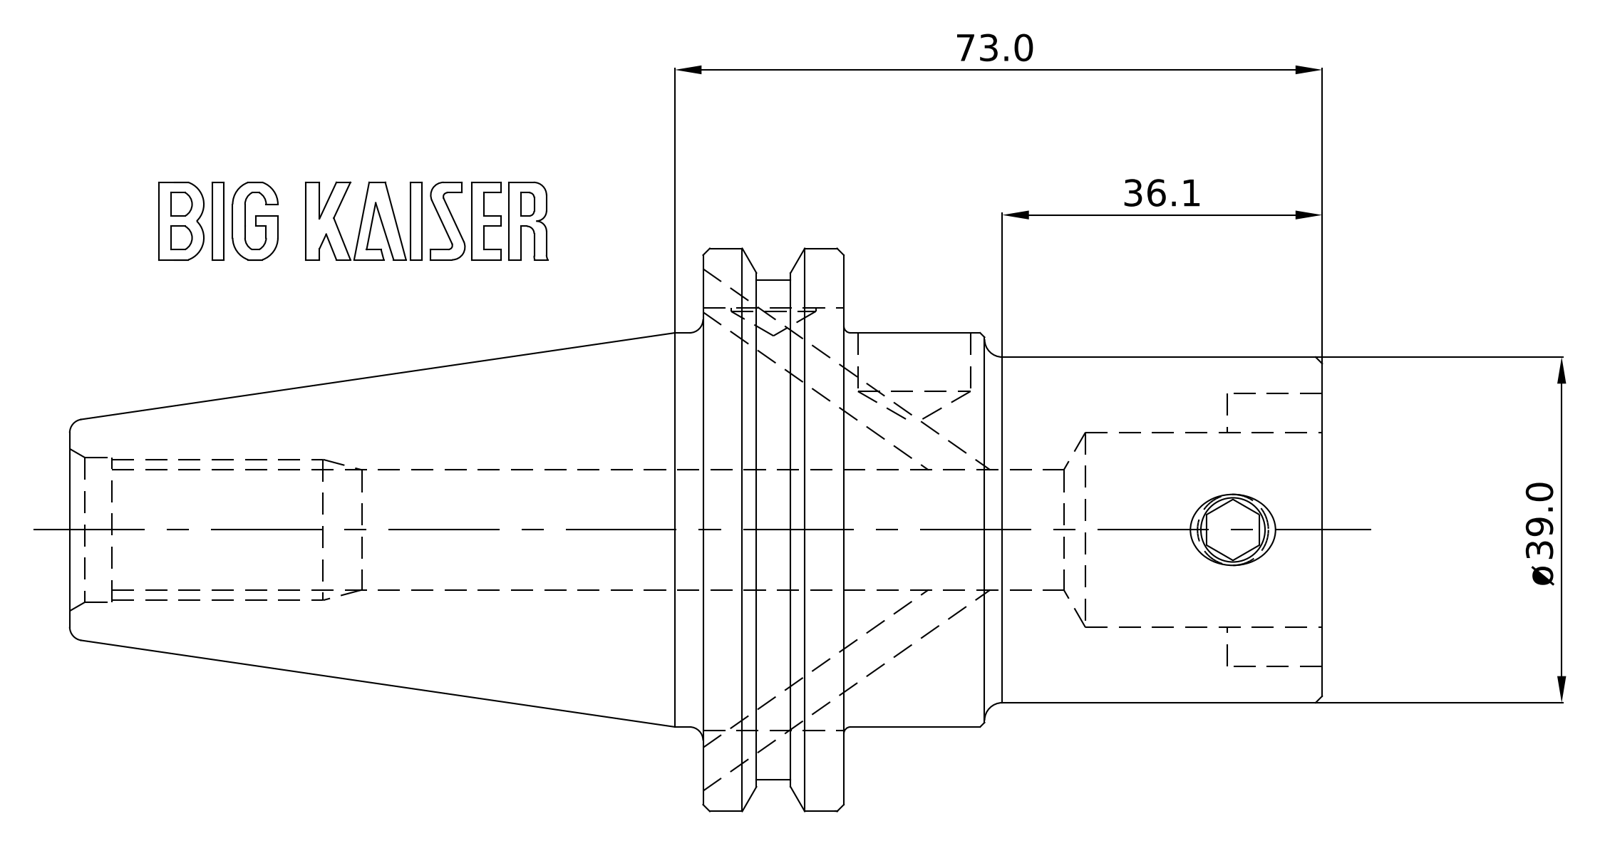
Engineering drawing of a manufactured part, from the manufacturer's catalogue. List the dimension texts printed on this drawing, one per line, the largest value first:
73.0
Ø39.0
36.1
